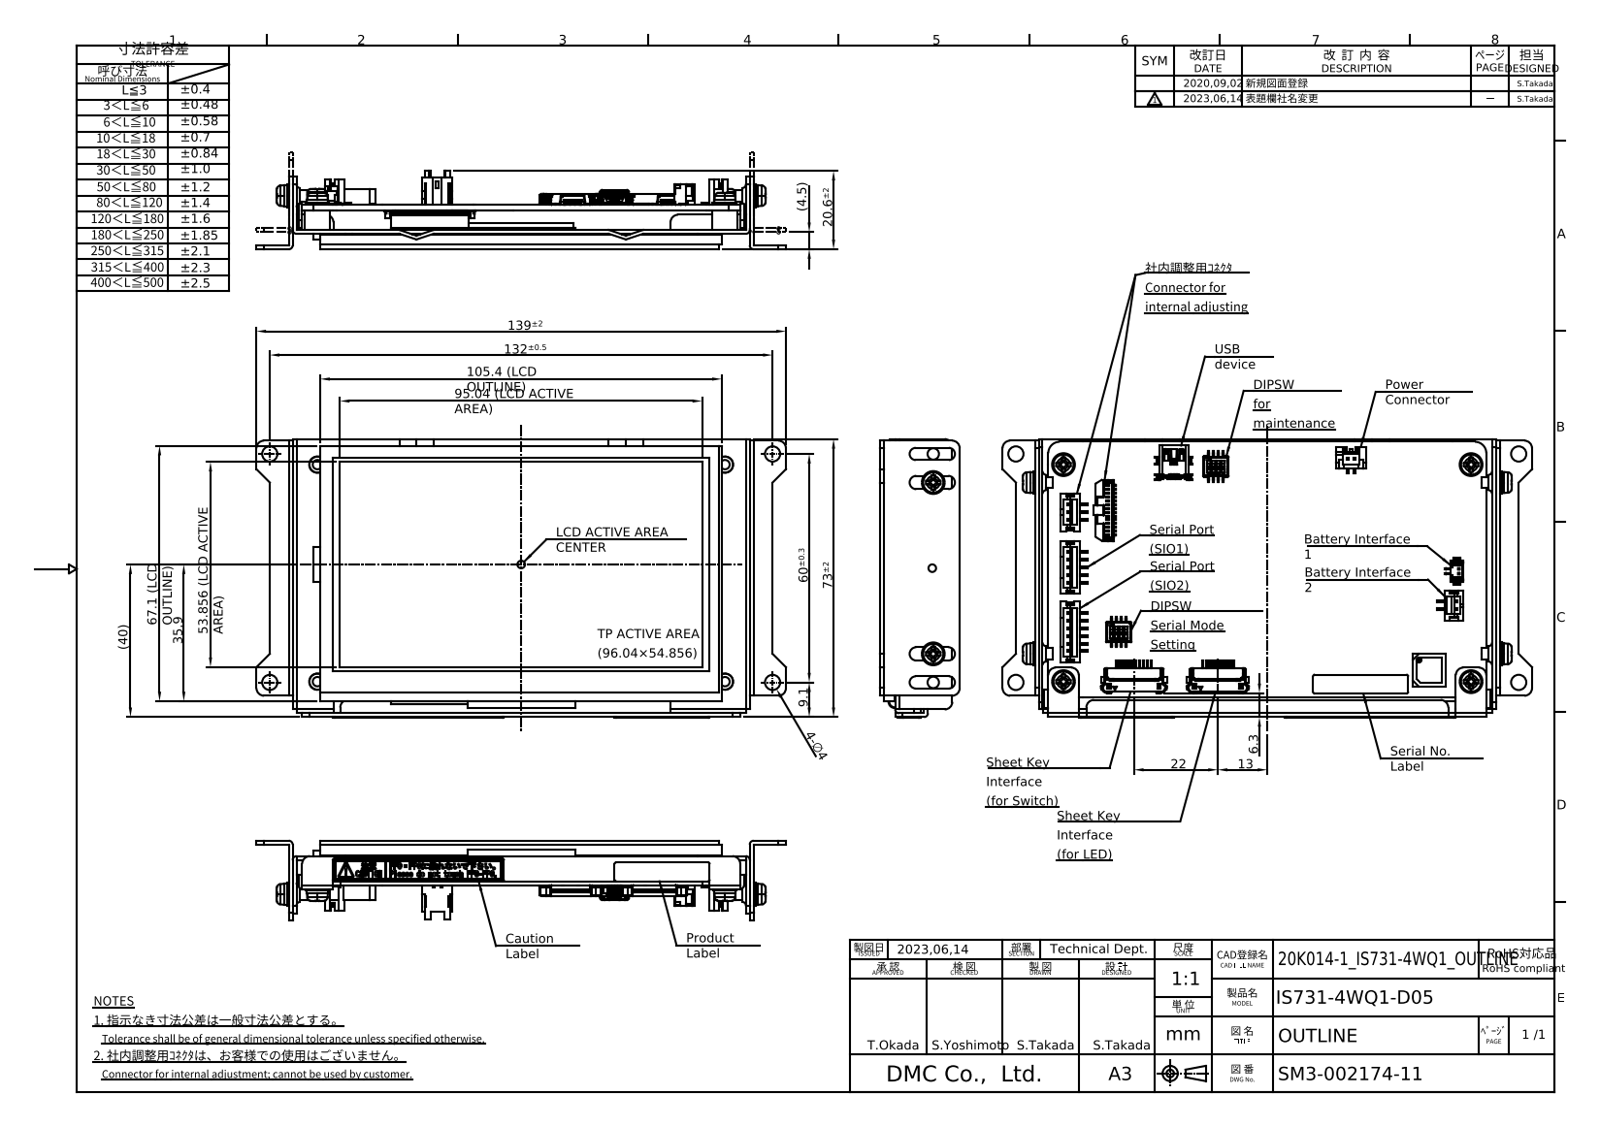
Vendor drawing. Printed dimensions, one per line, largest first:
139±2
132±0.5
105.4 (LCD OUTLINE)
95.04 (LCD ACTIVE AREA)
73±2
67.1 (LCD OUTLINE)
60±0.3
53.856 (LCD ACTIVE AREA)
(40)
35.9
22
20.6±2
13
9.1
6.3
(4.5)
4-∅4
